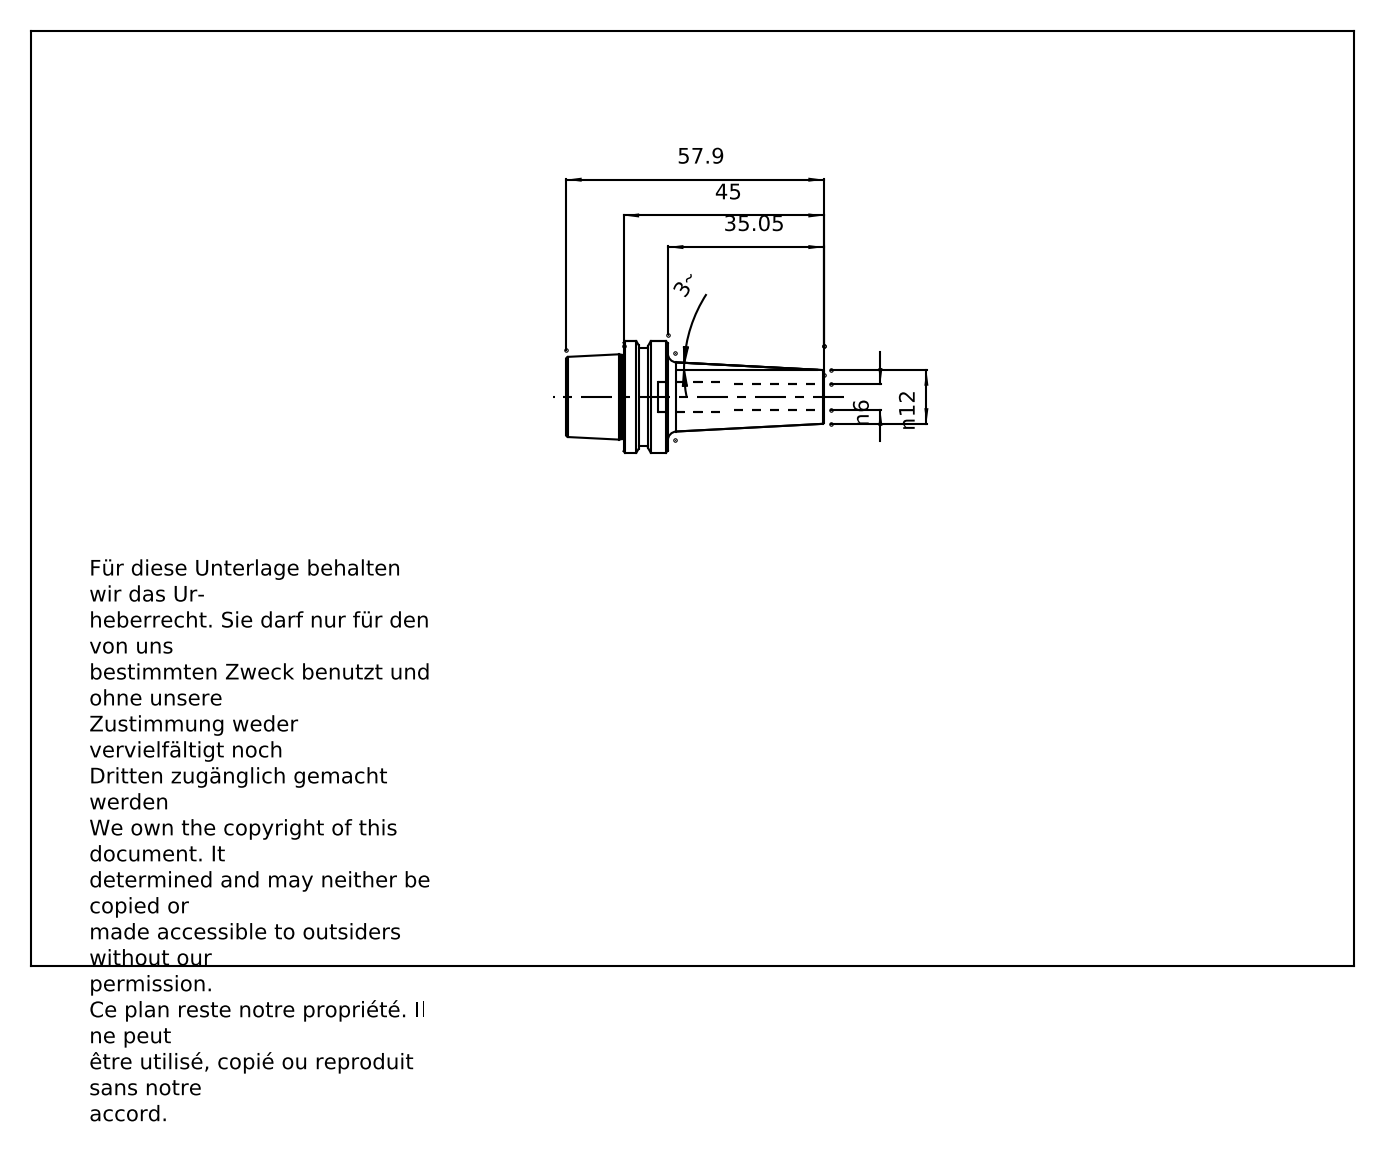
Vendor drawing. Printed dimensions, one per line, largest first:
57.9
45
35.05
n12
n6
